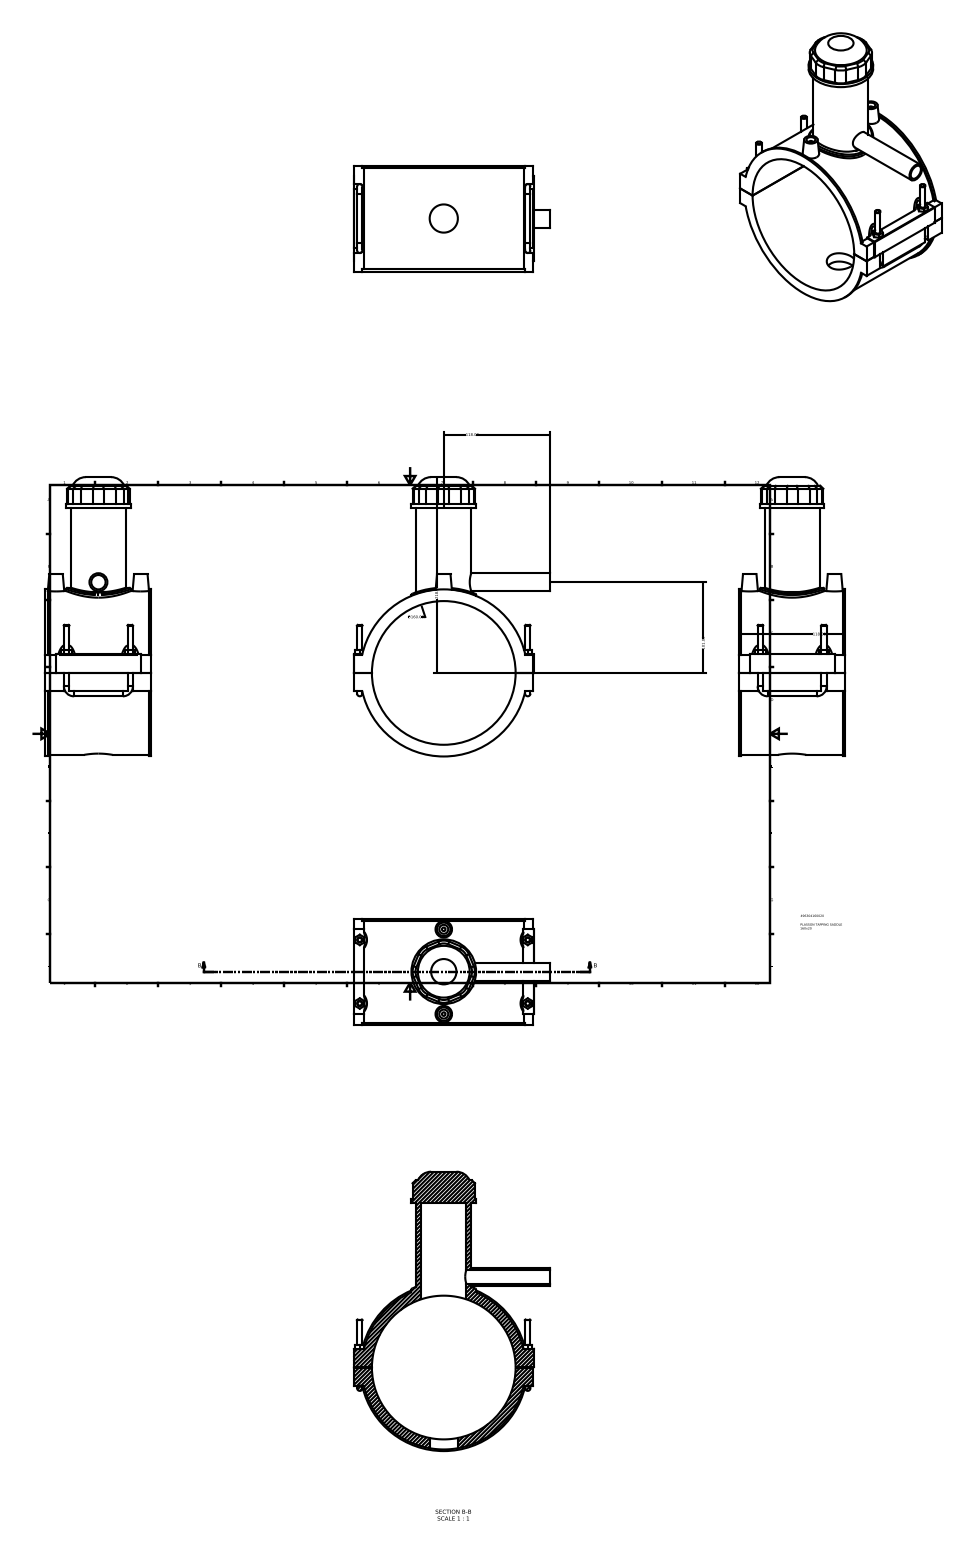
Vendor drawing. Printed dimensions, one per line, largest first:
218.00
∅160.00
118.00
118.00
101.00
